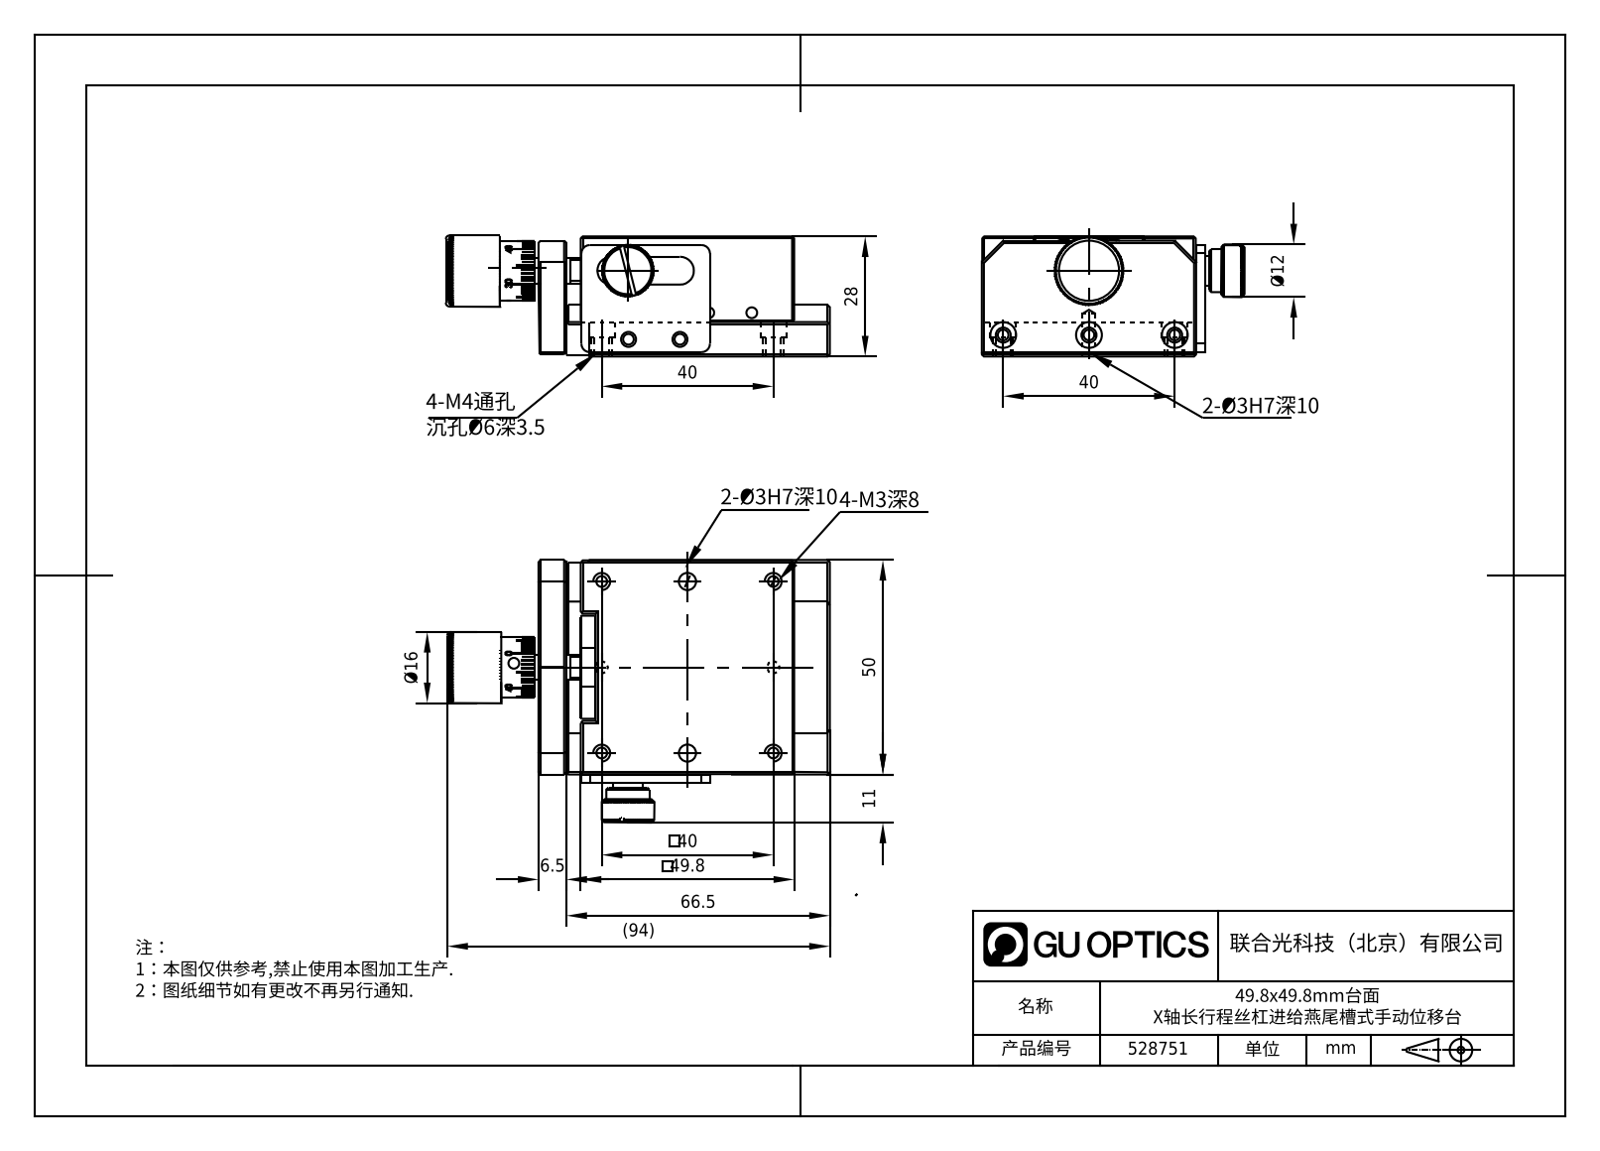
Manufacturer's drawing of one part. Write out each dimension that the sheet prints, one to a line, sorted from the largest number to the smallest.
(94)
66.5
50
49.8
40
40
40
28
Ø16
Ø12
11
6.5
